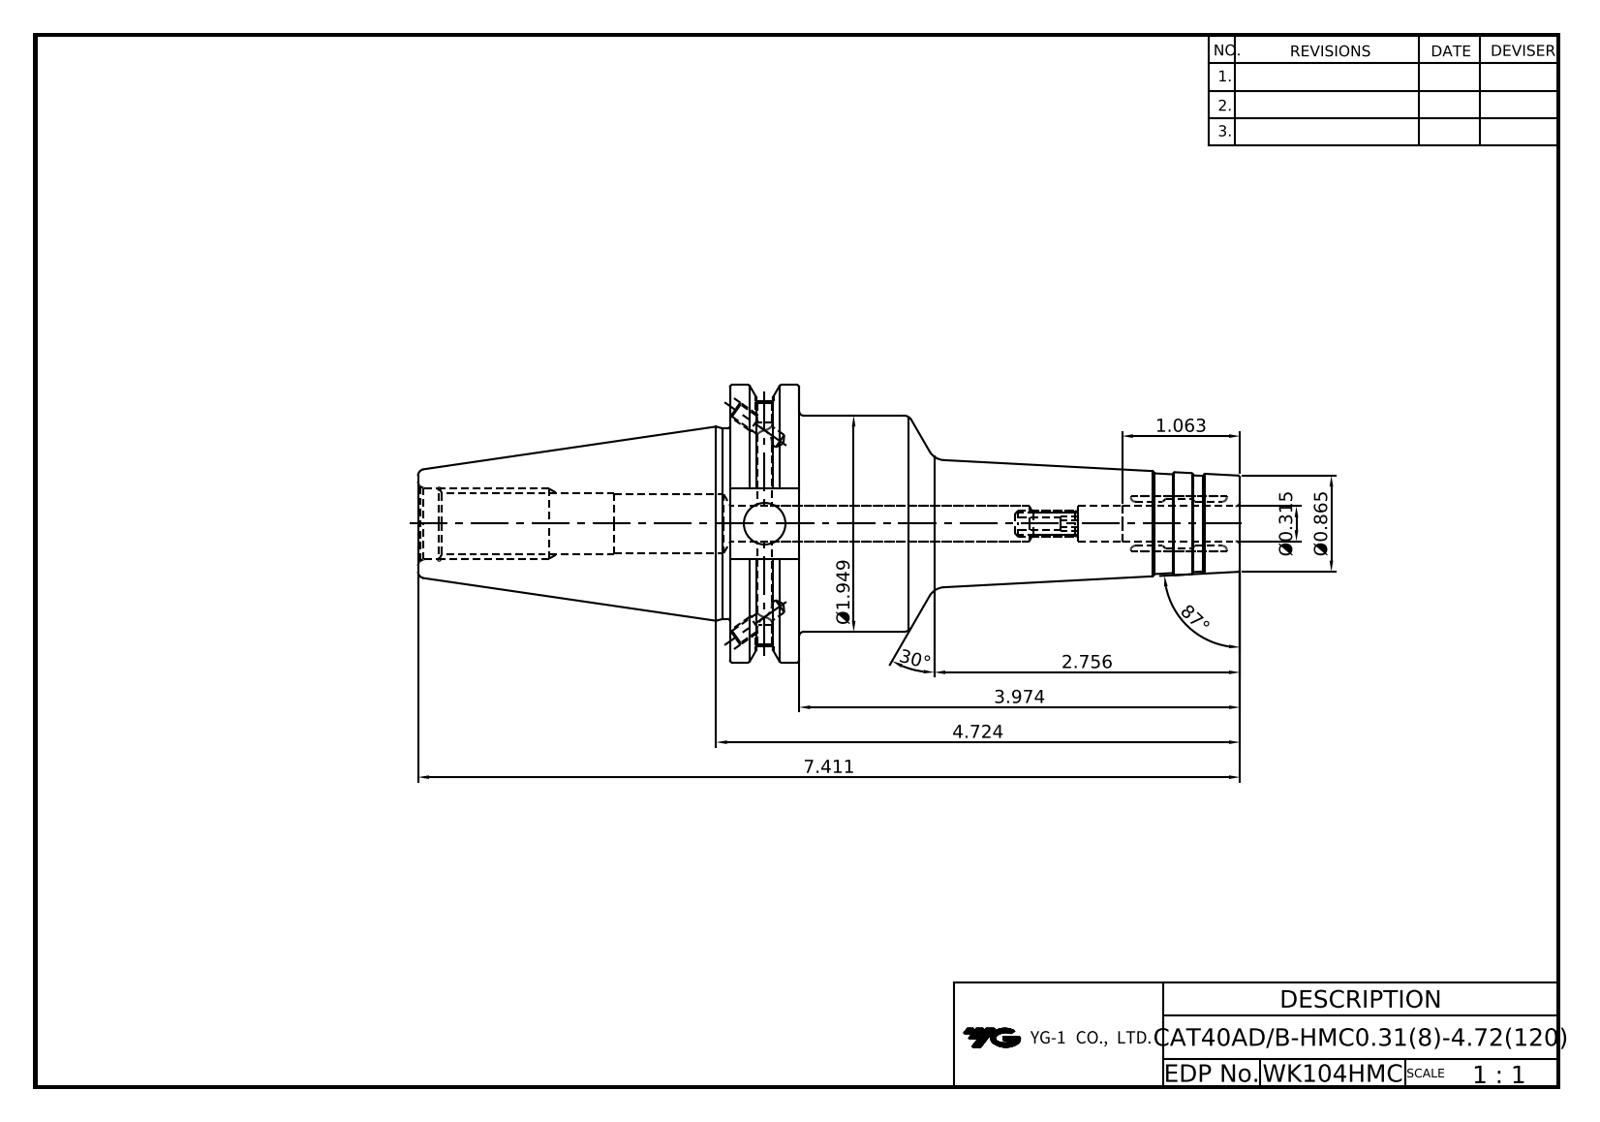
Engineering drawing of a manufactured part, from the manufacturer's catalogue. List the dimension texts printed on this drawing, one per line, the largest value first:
87°
30°
7.411
4.724
3.974
2.756
Ø1.949
1.063
Ø0.865
Ø0.315
